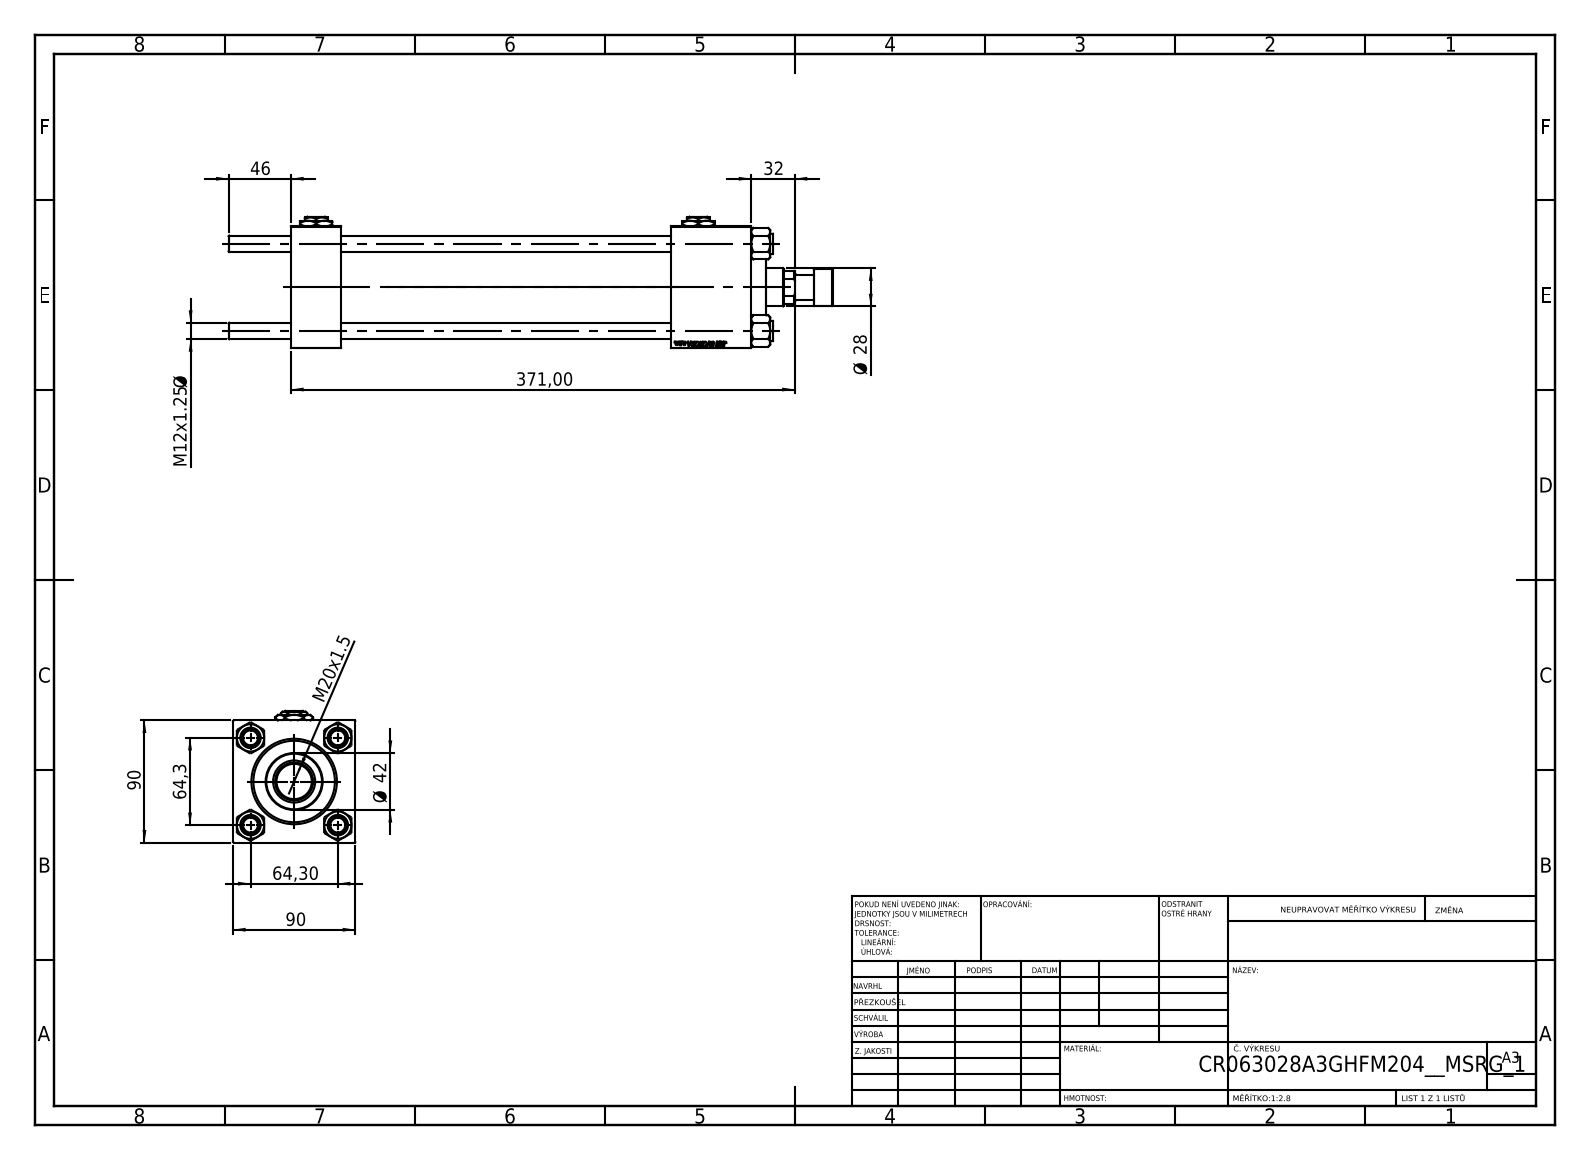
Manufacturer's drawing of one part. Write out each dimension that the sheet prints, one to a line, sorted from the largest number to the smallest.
371,00
90
90
64,3
64,30
46
Ø 42
32
Ø 28
M20x1.5
M12x1.25 Ø
